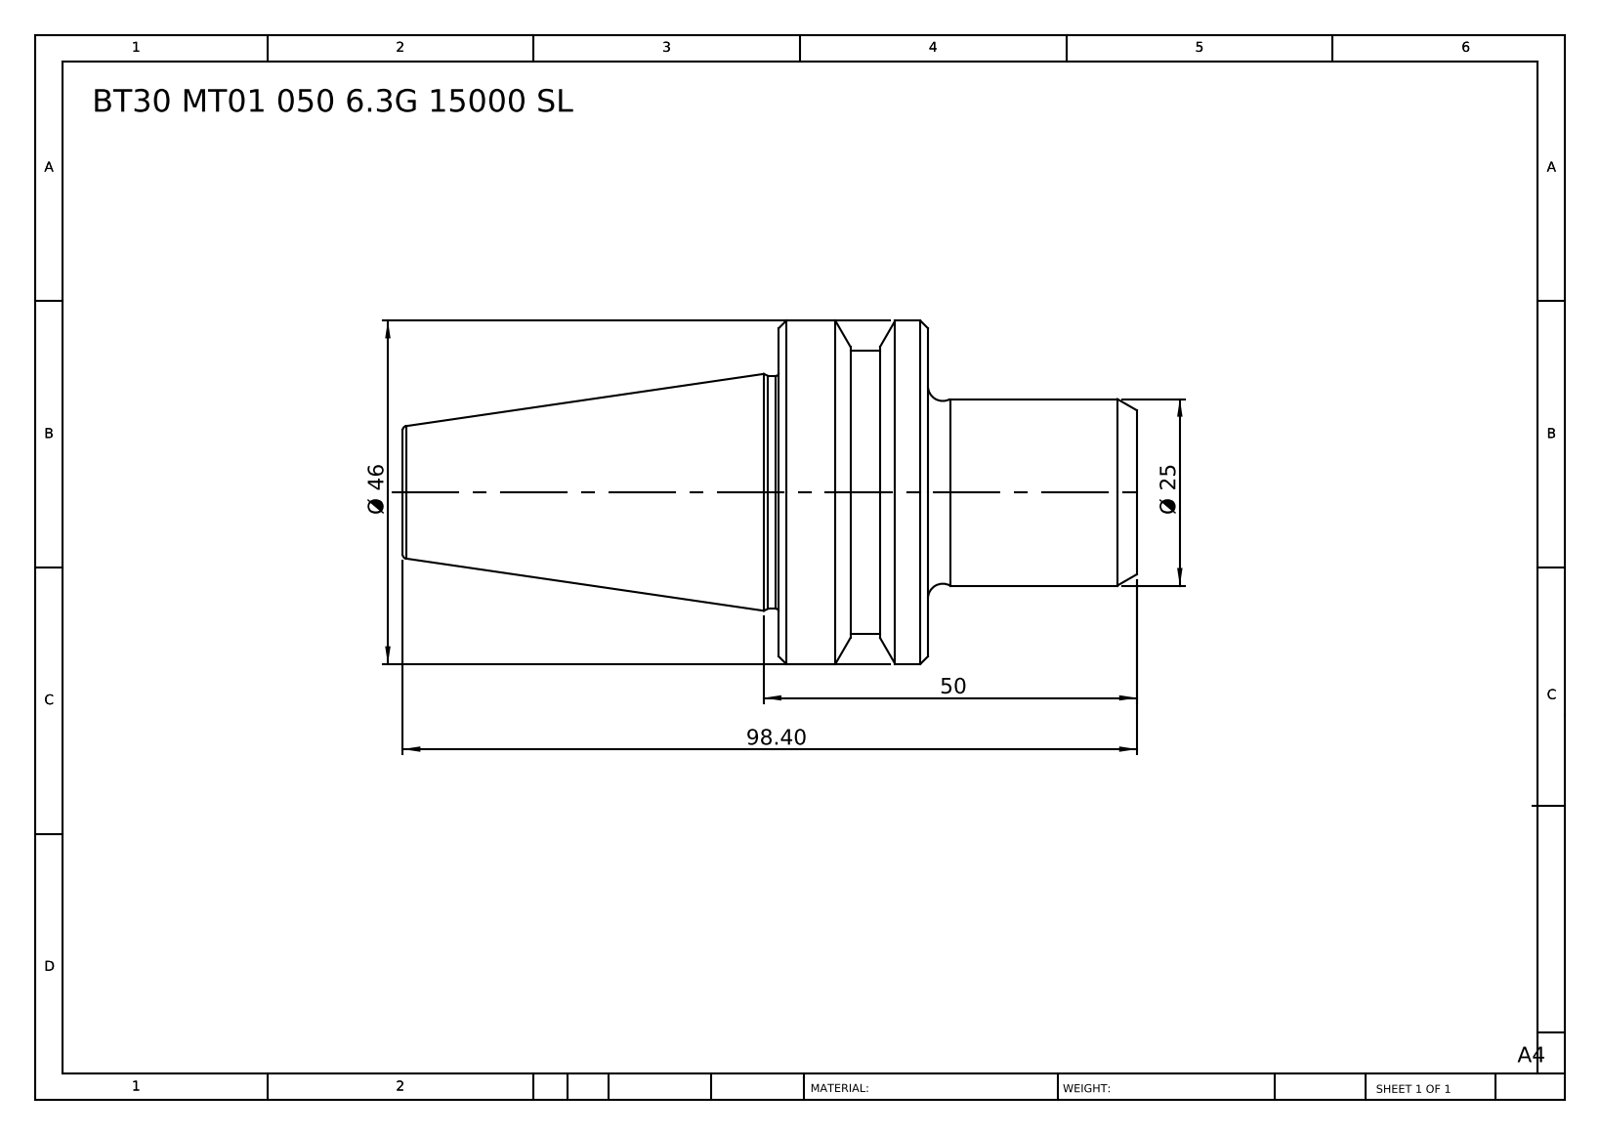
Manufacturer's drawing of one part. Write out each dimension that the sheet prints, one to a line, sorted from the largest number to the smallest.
98.40
50
Ø 46
Ø 25
